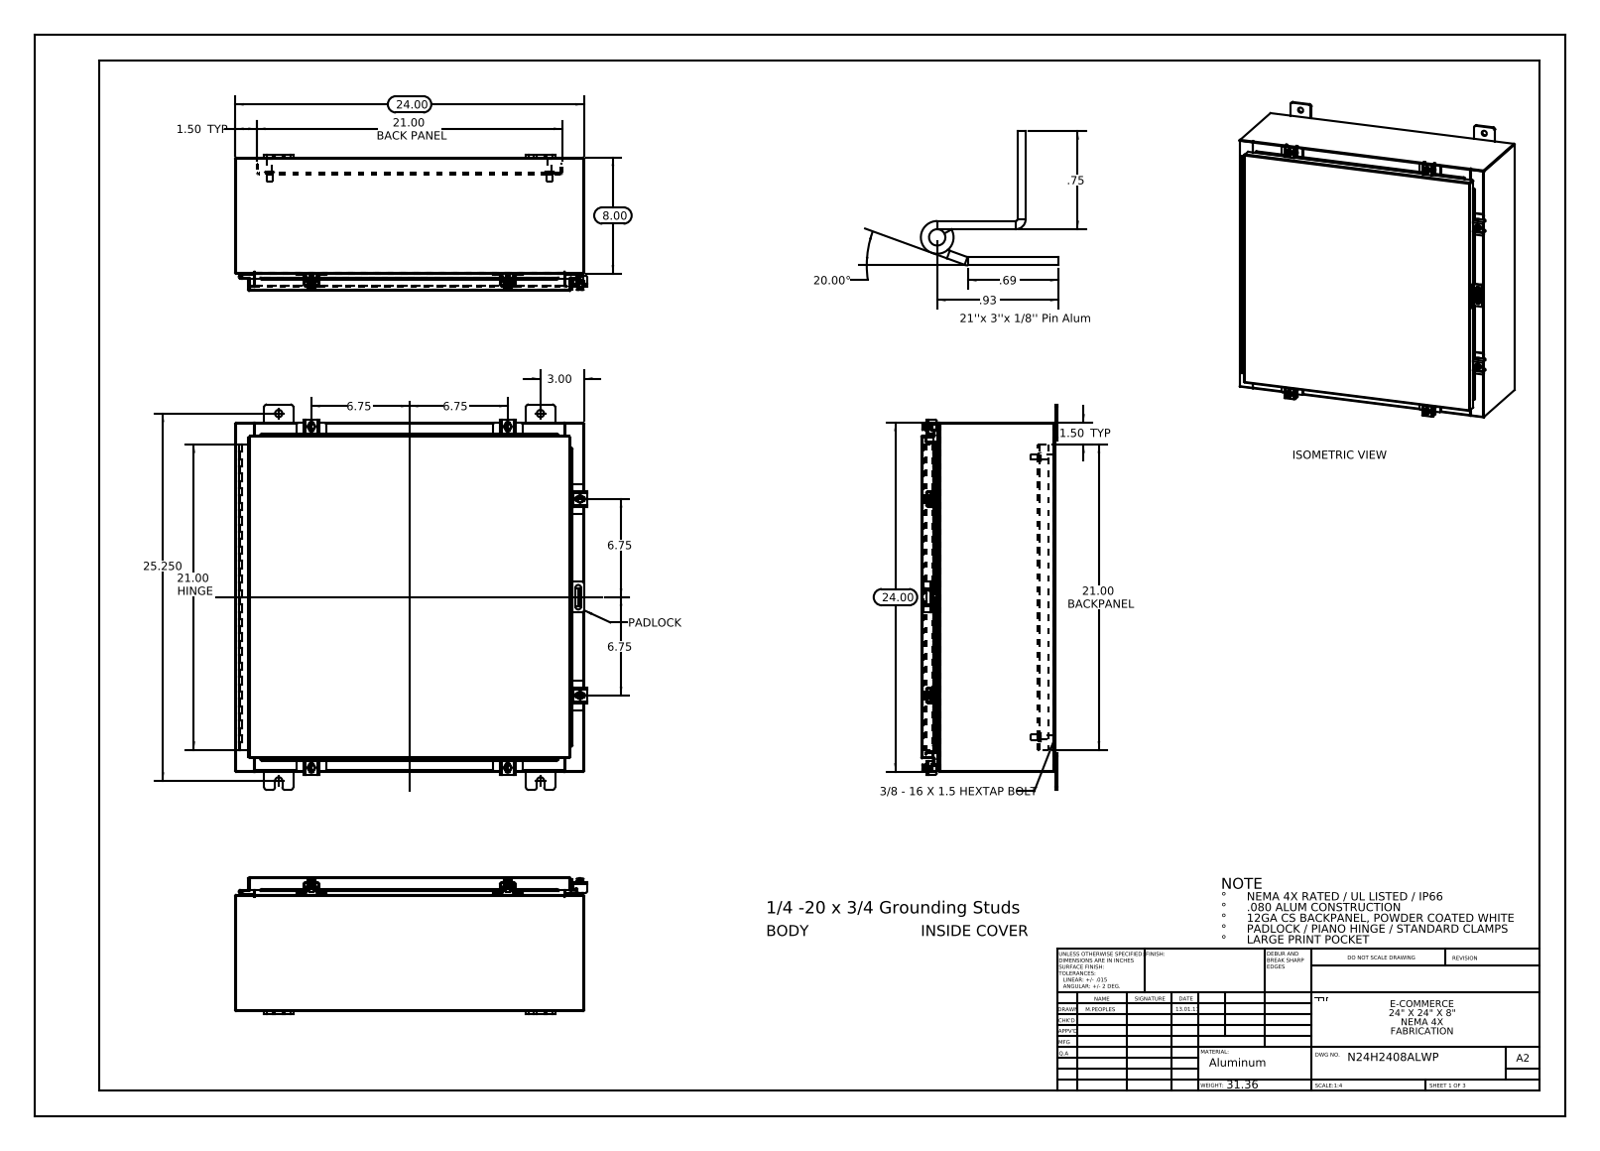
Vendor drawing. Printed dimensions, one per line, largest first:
25.250
24.00
24.00
21.00 HINGE
21.00 BACK PANEL
21.00 BACKPANEL
20.00°
8.00
6.75
6.75
6.75
6.75
3.00
1.50 TYP
1.50 TYP
.93
.75
.69
